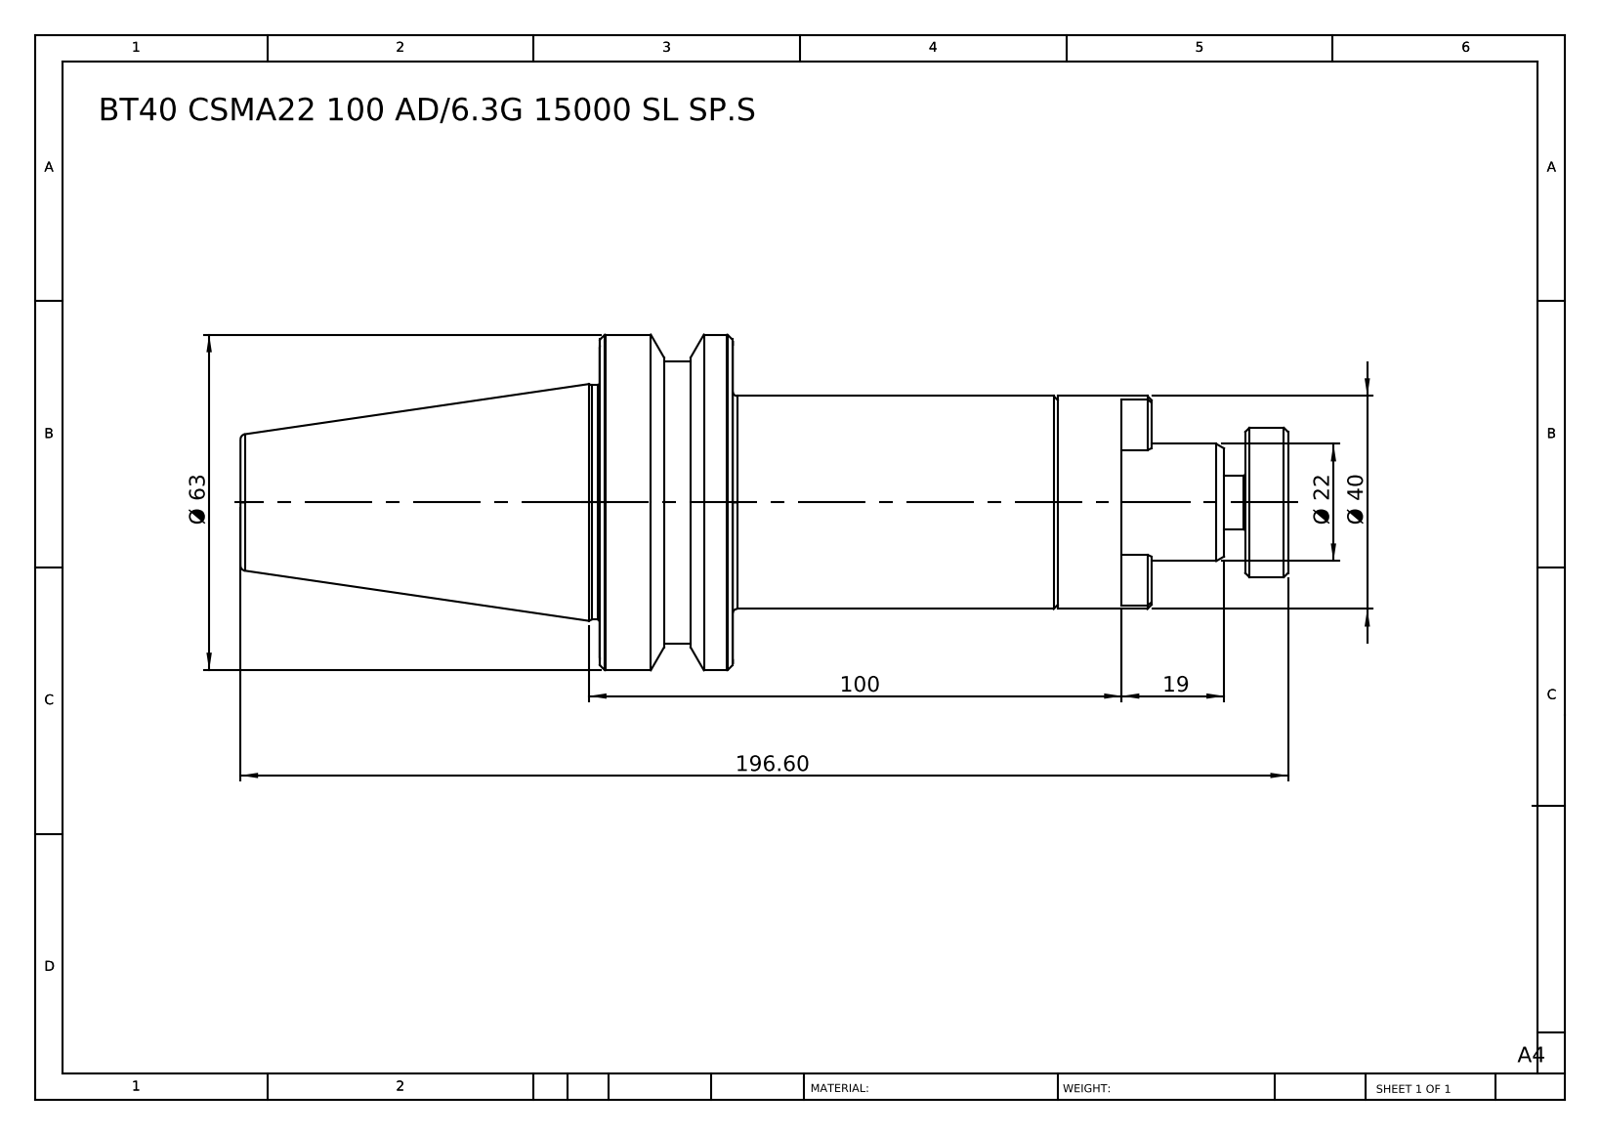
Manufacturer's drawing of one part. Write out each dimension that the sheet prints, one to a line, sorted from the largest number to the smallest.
196.60
100
Ø 63
Ø 40
Ø 22
19
